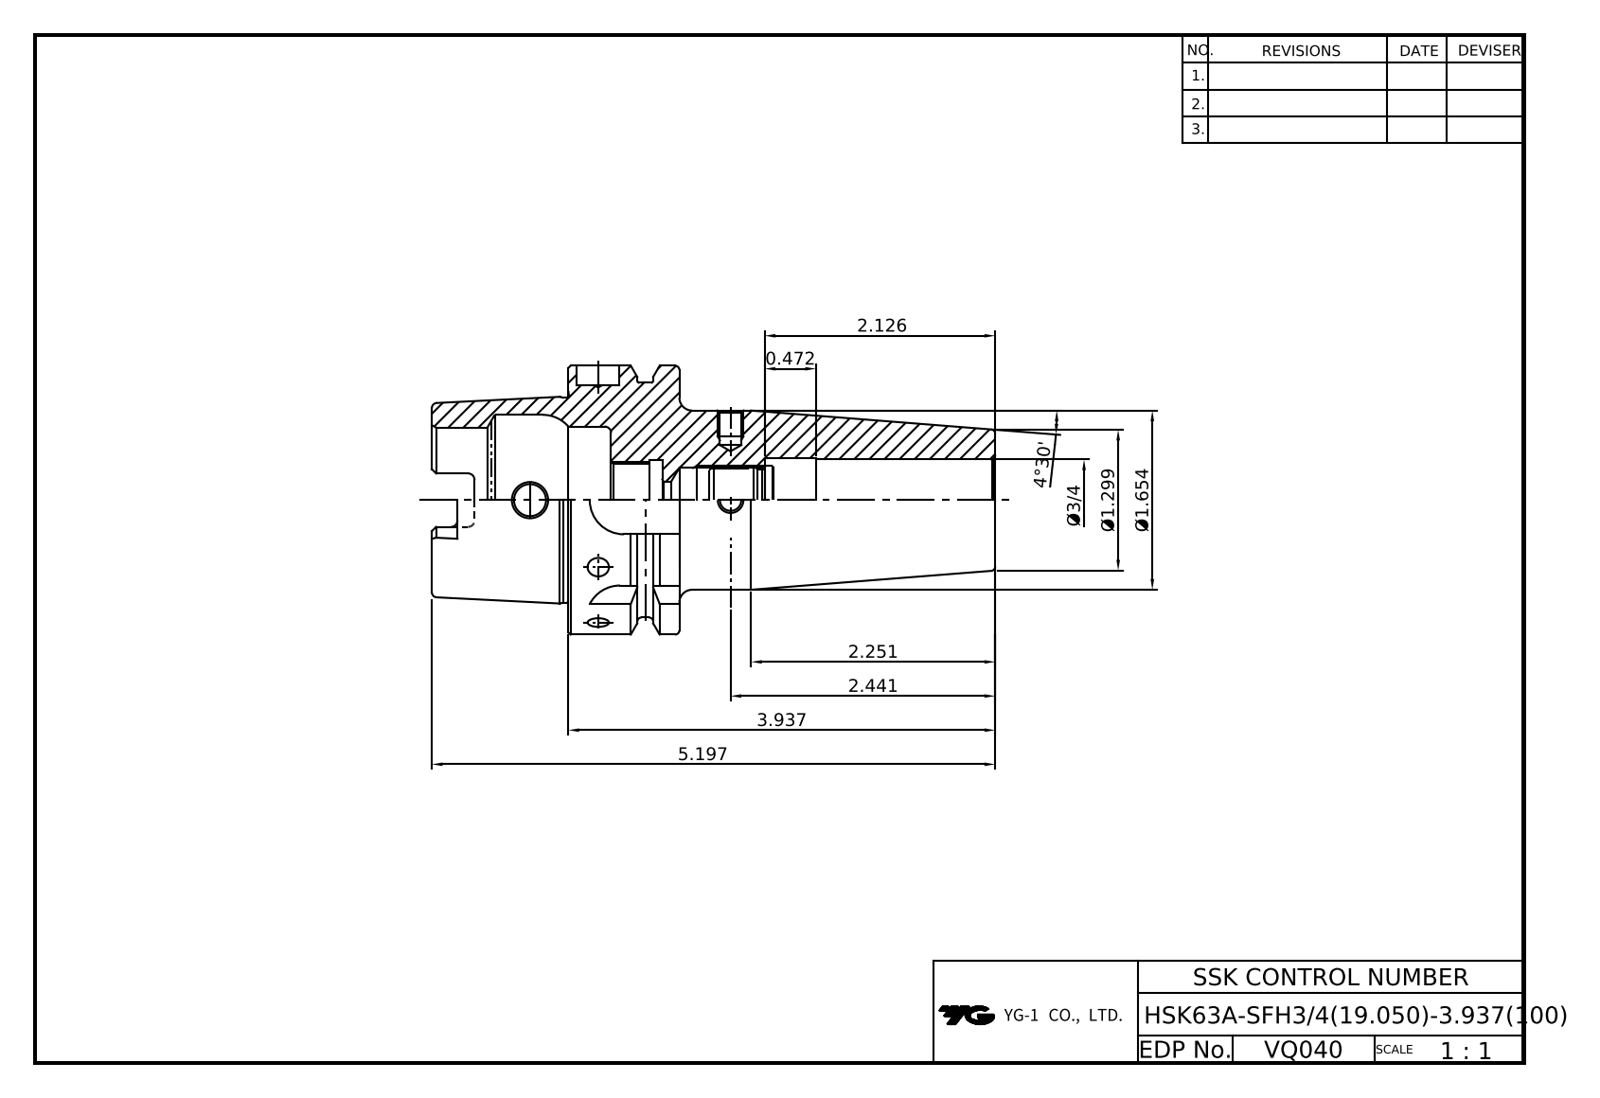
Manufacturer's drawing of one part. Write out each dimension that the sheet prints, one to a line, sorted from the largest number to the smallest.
5.197
4°30'
3.937
2.441
2.251
2.126
Ø1.654
Ø1.299
Ø3/4
0.472
